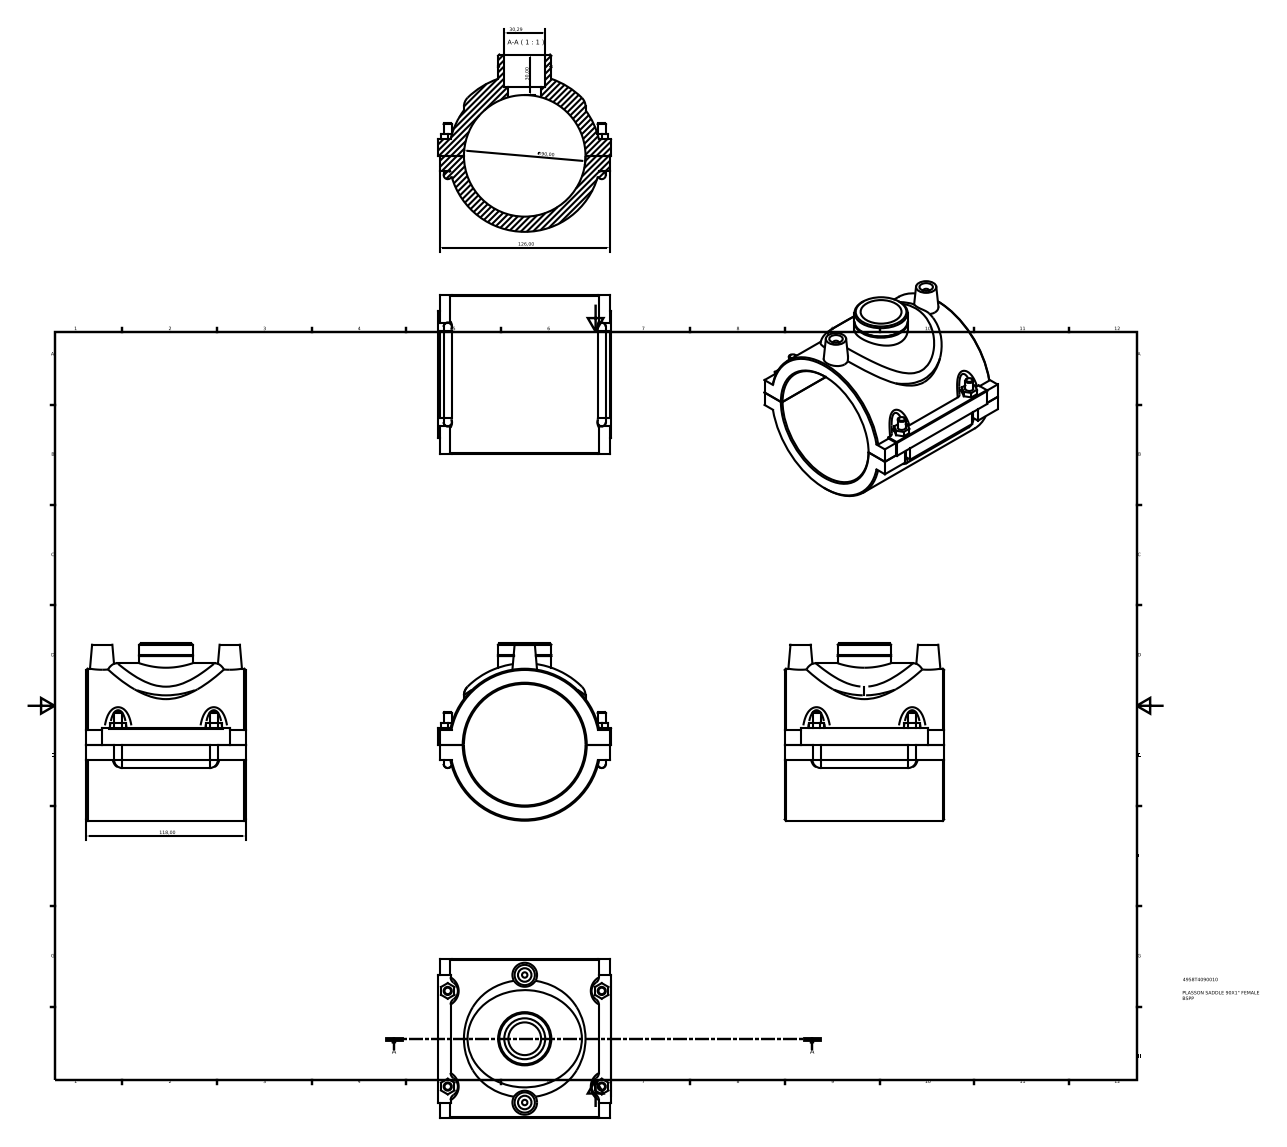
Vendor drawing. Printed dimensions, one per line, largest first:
126,00
118,00
∅90,00
30,29
30,00
